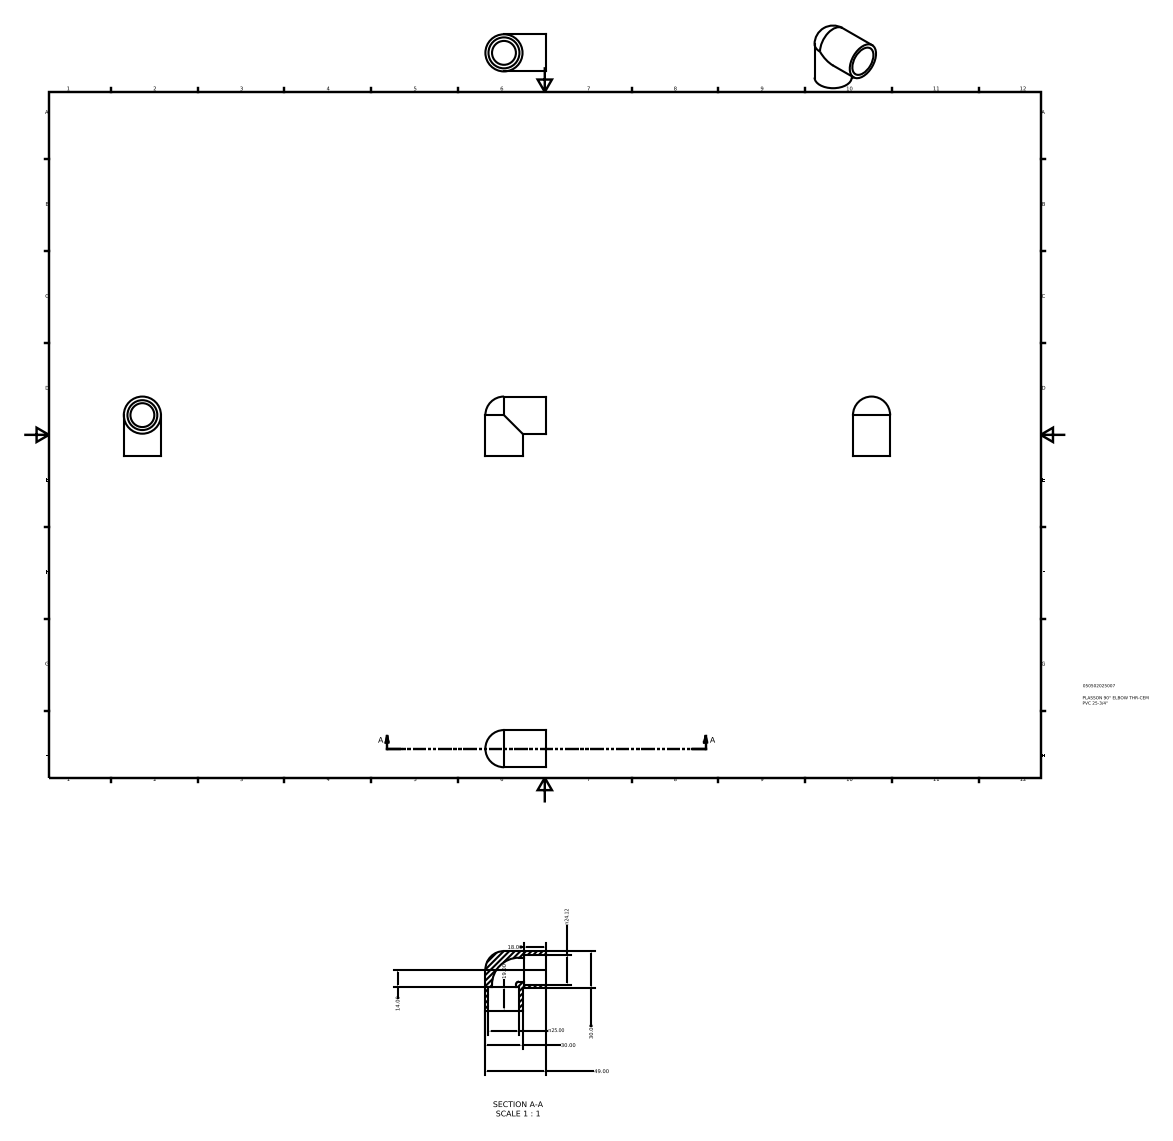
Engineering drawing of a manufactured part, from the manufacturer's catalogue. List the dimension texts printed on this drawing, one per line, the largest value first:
49.00
30.00
30.00
n25.00
n24.12
19.00
18.00
14.00
